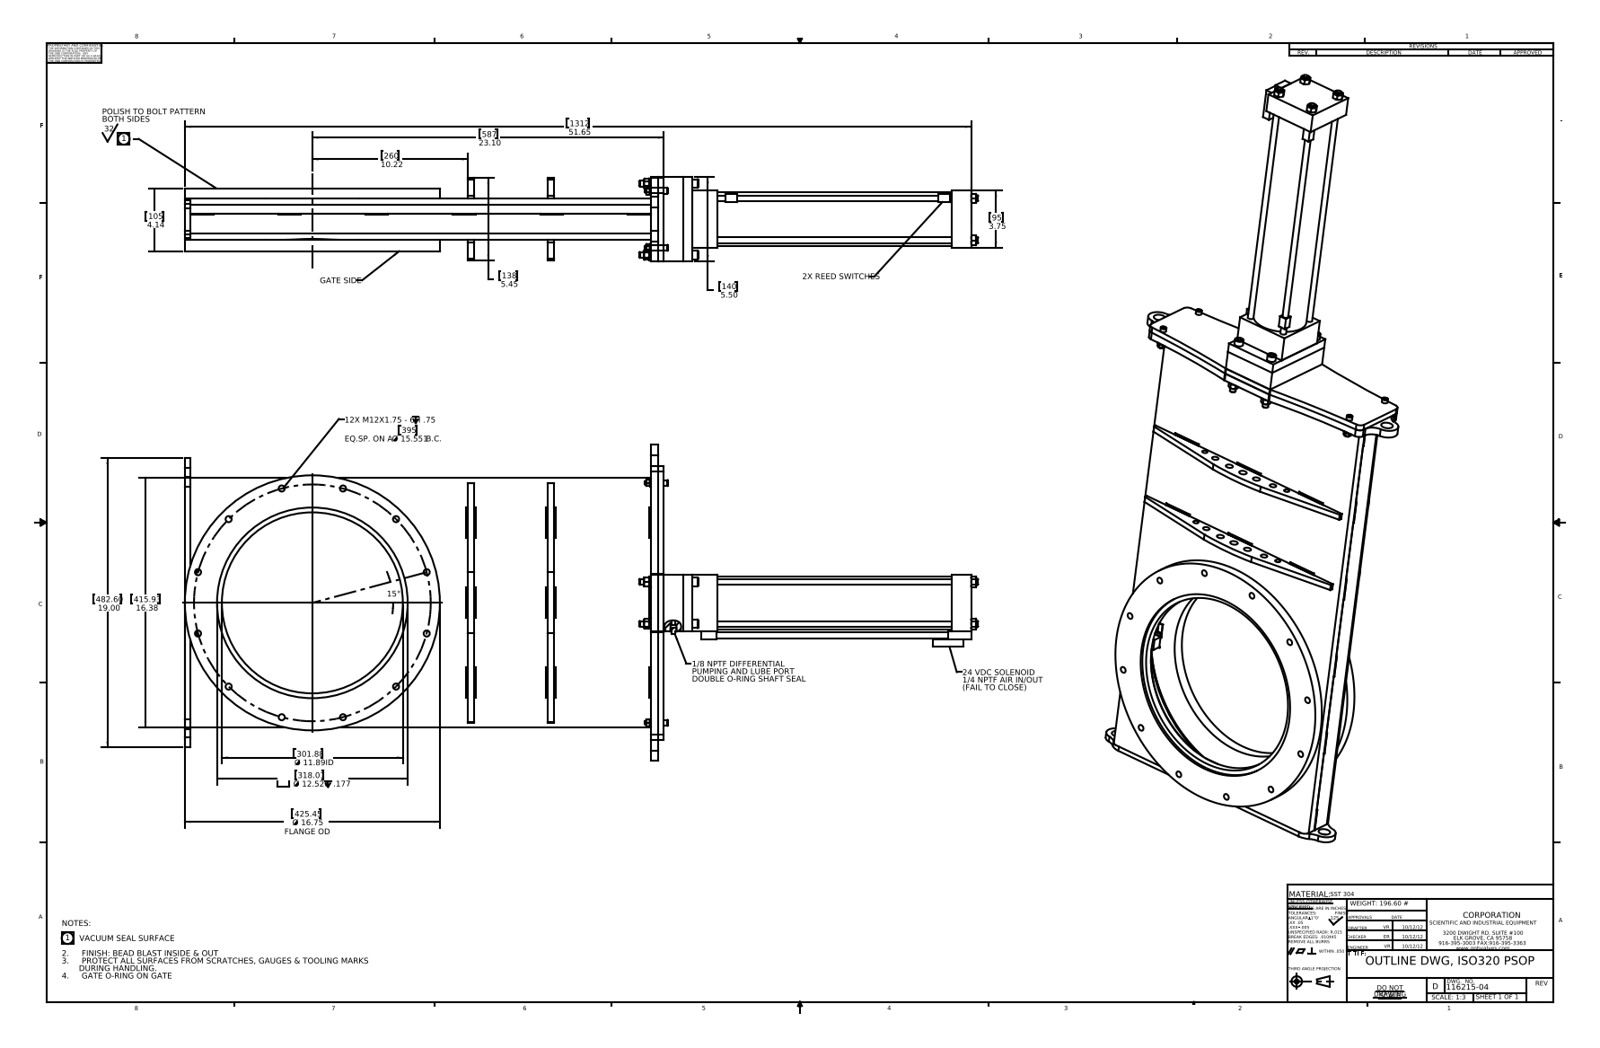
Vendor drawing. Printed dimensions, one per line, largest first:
1312 51.65
587 23.10
482.60 19.00
425.45 Ø 16.75 FLANGE OD
415.93 16.38
318.01 Ø 12.520 .177
301.88 Ø 11.89 ID
260 10.22
140 5.50
138 5.45
105 4.14
95 3.75
15°
